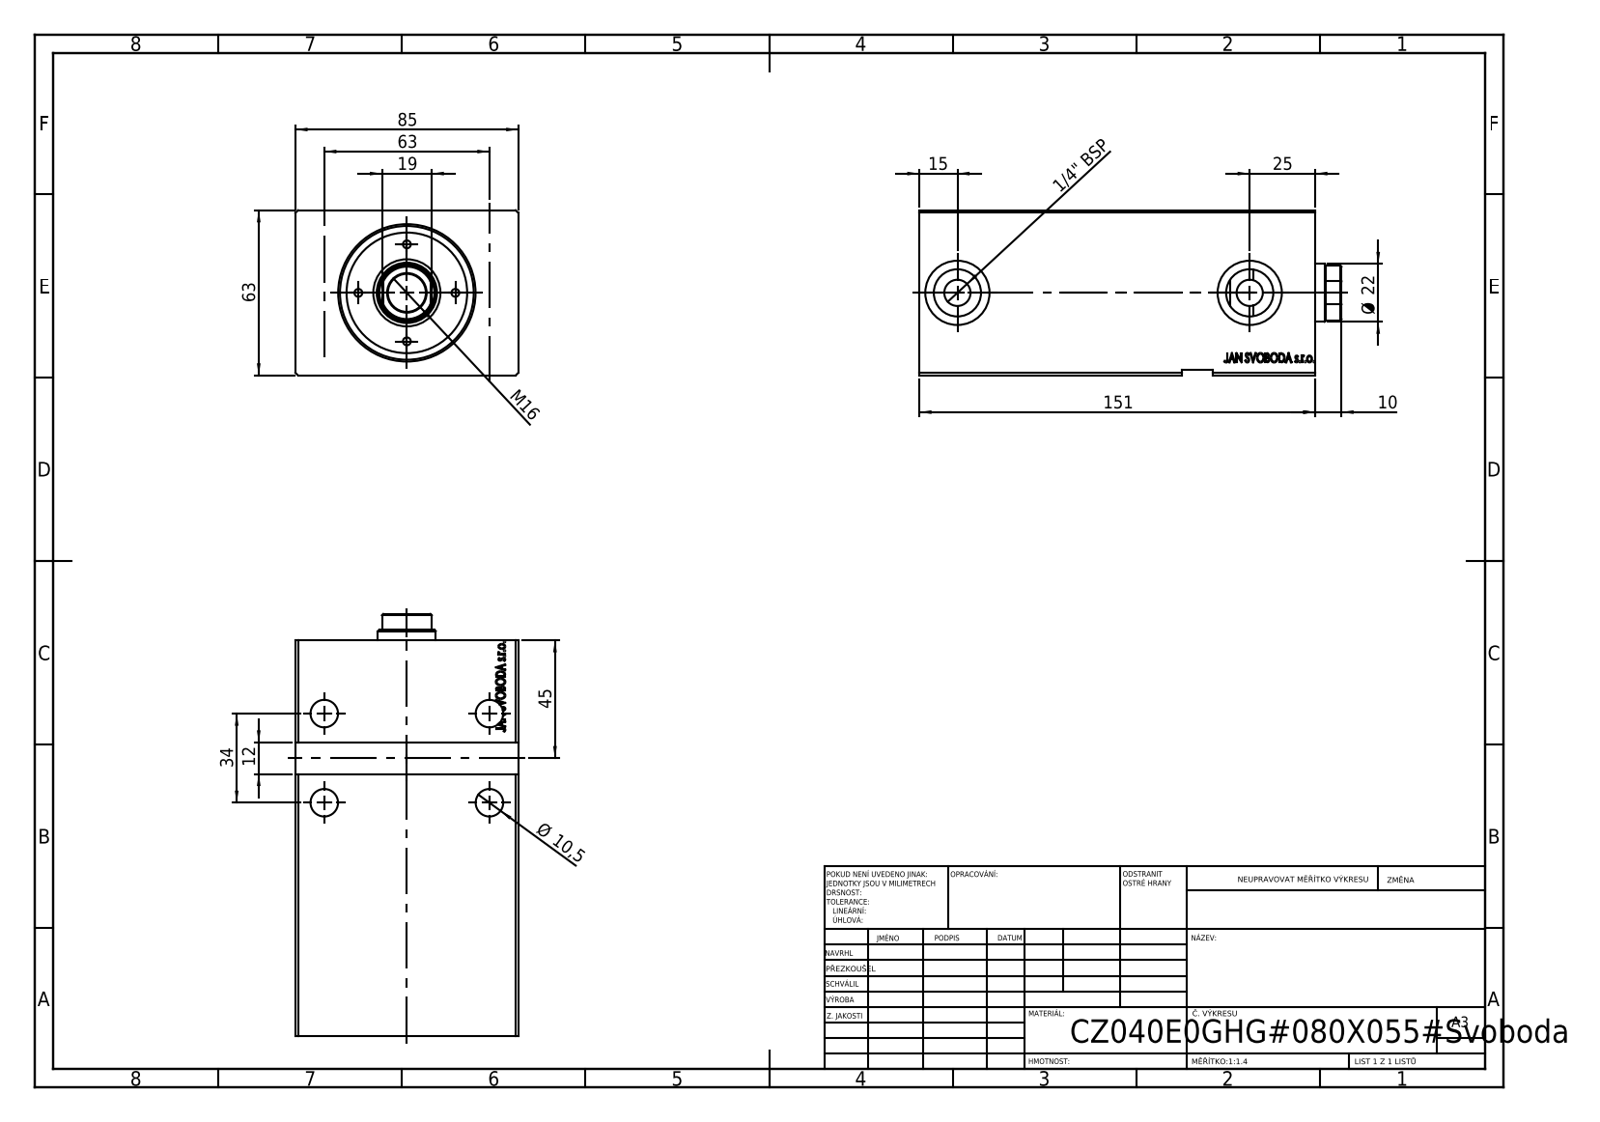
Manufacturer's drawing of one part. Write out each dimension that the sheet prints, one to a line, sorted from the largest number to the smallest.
151
85
63
63
45
34
25
Ø 22
19
M16
15
12
Ø 10,5
10
1/4" BSP
